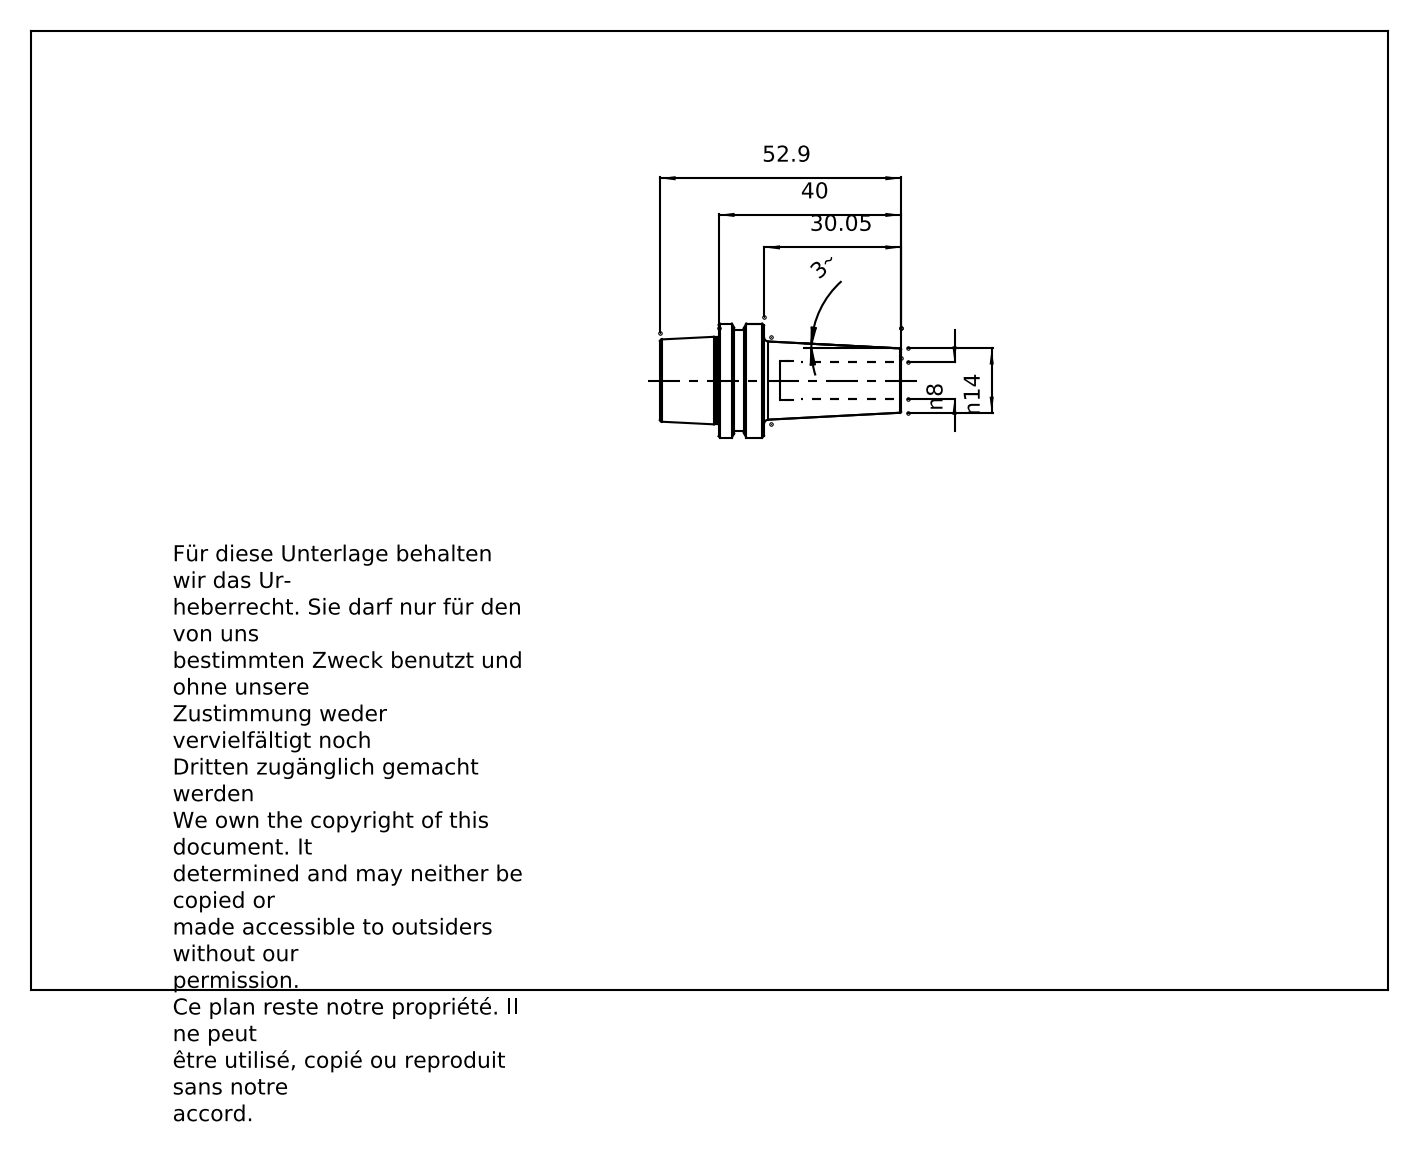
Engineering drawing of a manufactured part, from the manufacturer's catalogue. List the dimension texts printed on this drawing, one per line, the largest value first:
52.9
40
30.05
n14
n8
